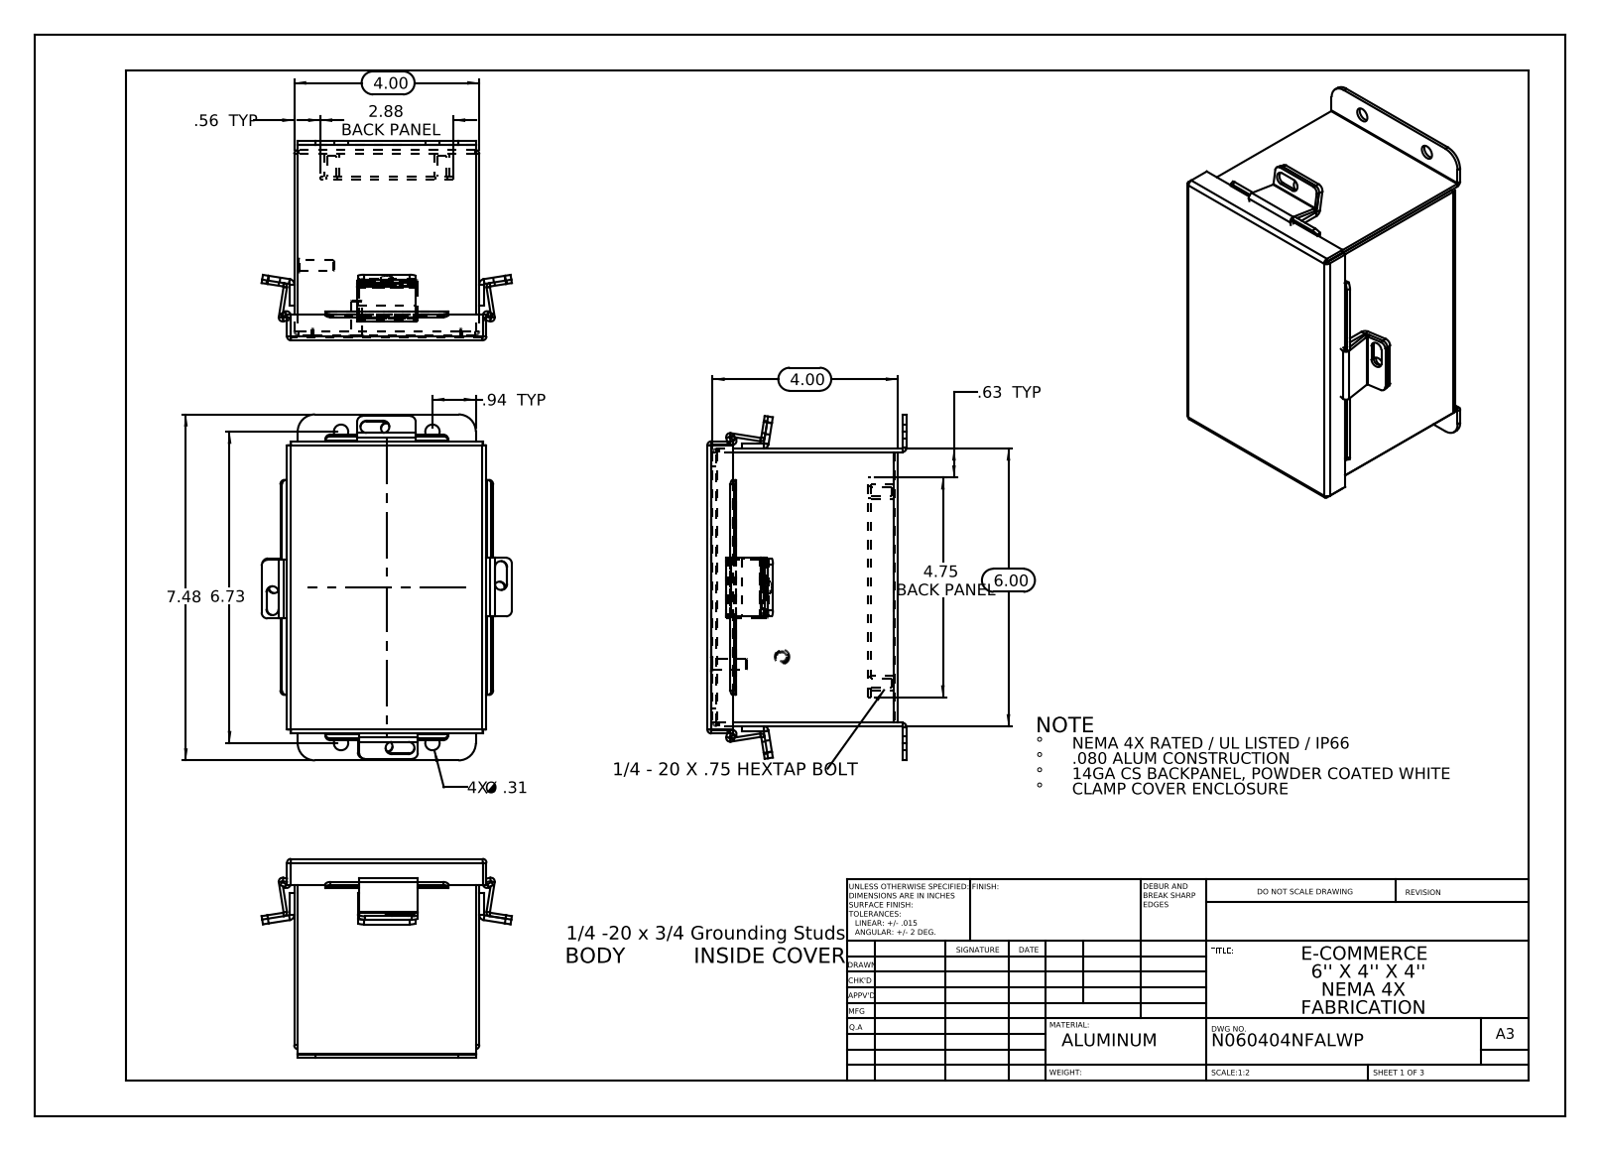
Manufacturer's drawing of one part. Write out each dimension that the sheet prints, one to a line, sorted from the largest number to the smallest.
7.48
6.73
6.00
4.75 BACK PANEL
4.00
4.00
2.88 BACK PANEL
.94 TYP
.63 TYP
.56 TYP
4X Ø .31
